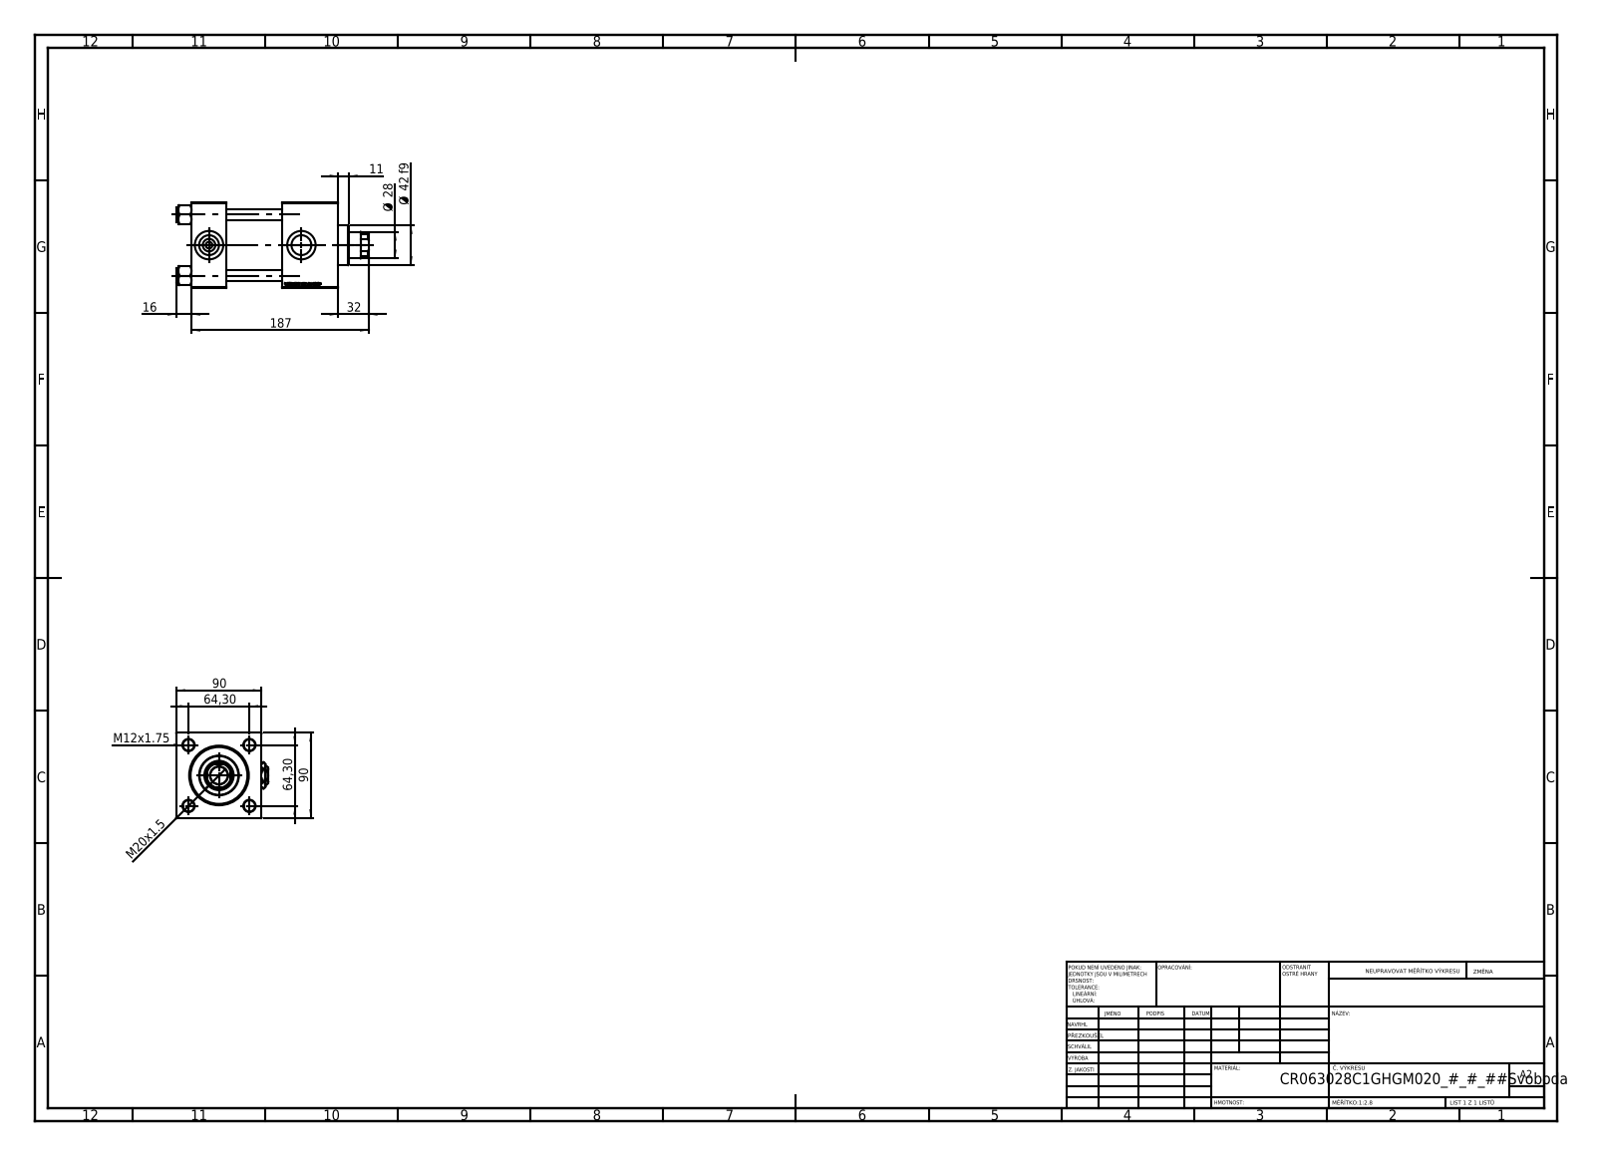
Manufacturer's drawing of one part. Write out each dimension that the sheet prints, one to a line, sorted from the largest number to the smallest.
187
90
90
64,30
64,30
Ø 42 f9
32
Ø 28
M20x1.5
16
M12x1.75
11
